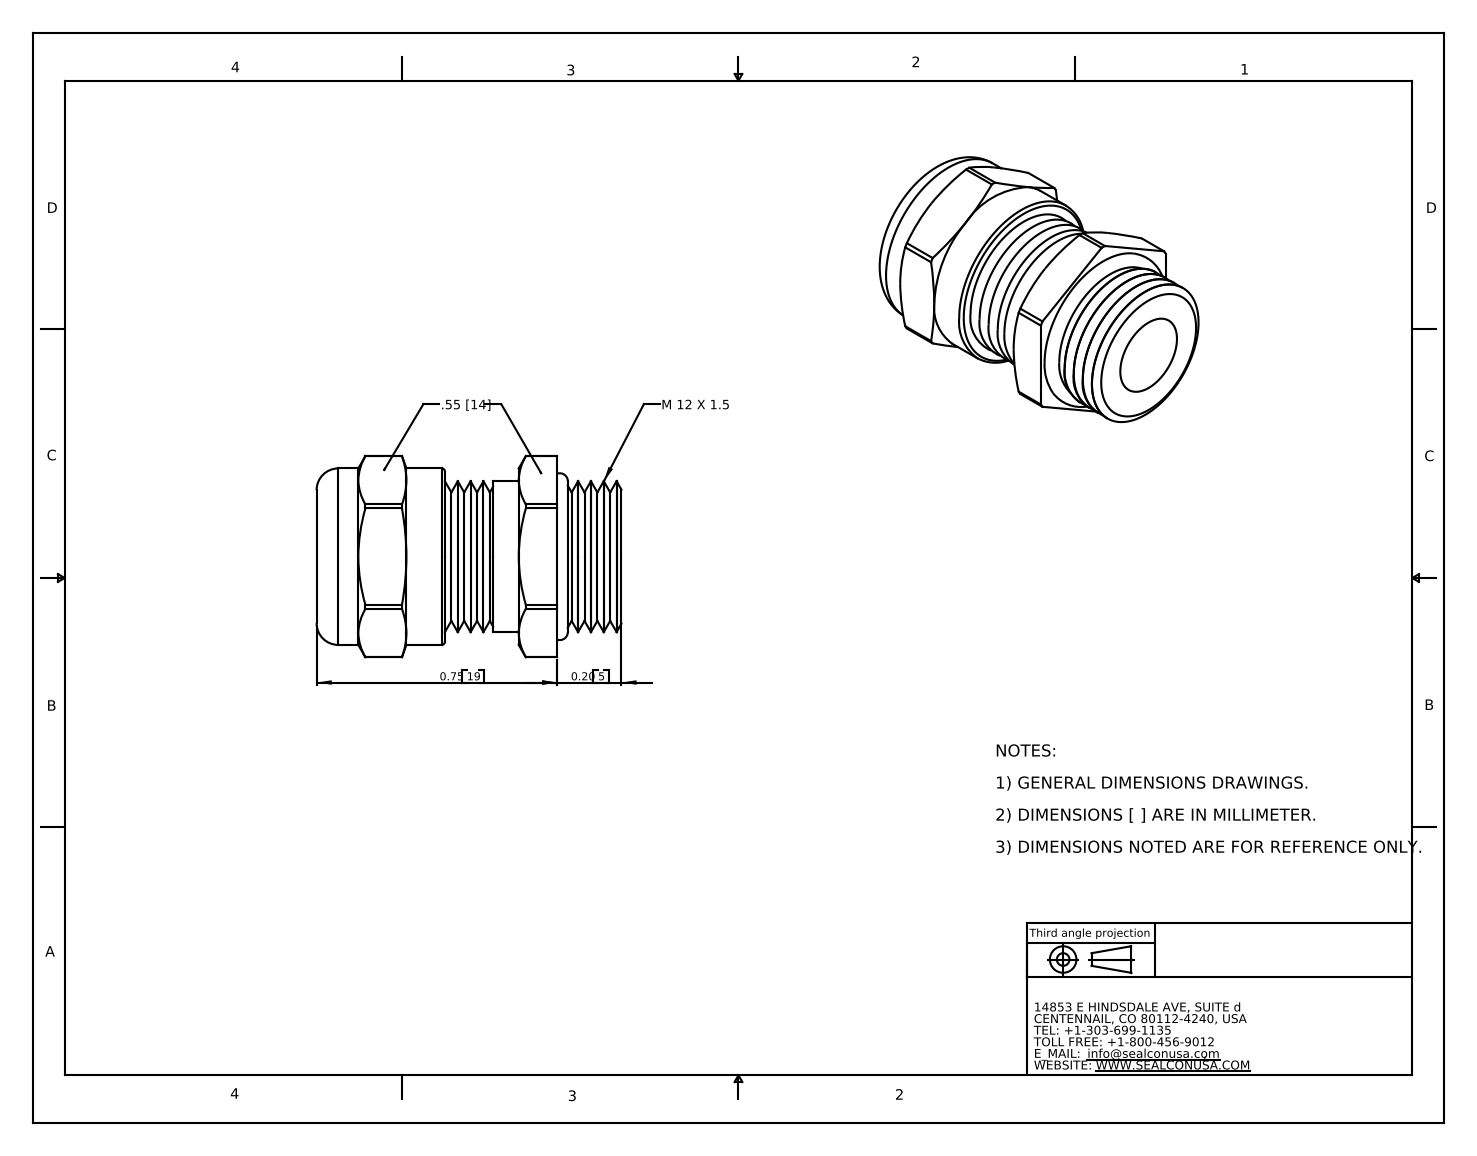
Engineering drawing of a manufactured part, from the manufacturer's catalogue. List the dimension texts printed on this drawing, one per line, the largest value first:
0.75 19
0.20 5
